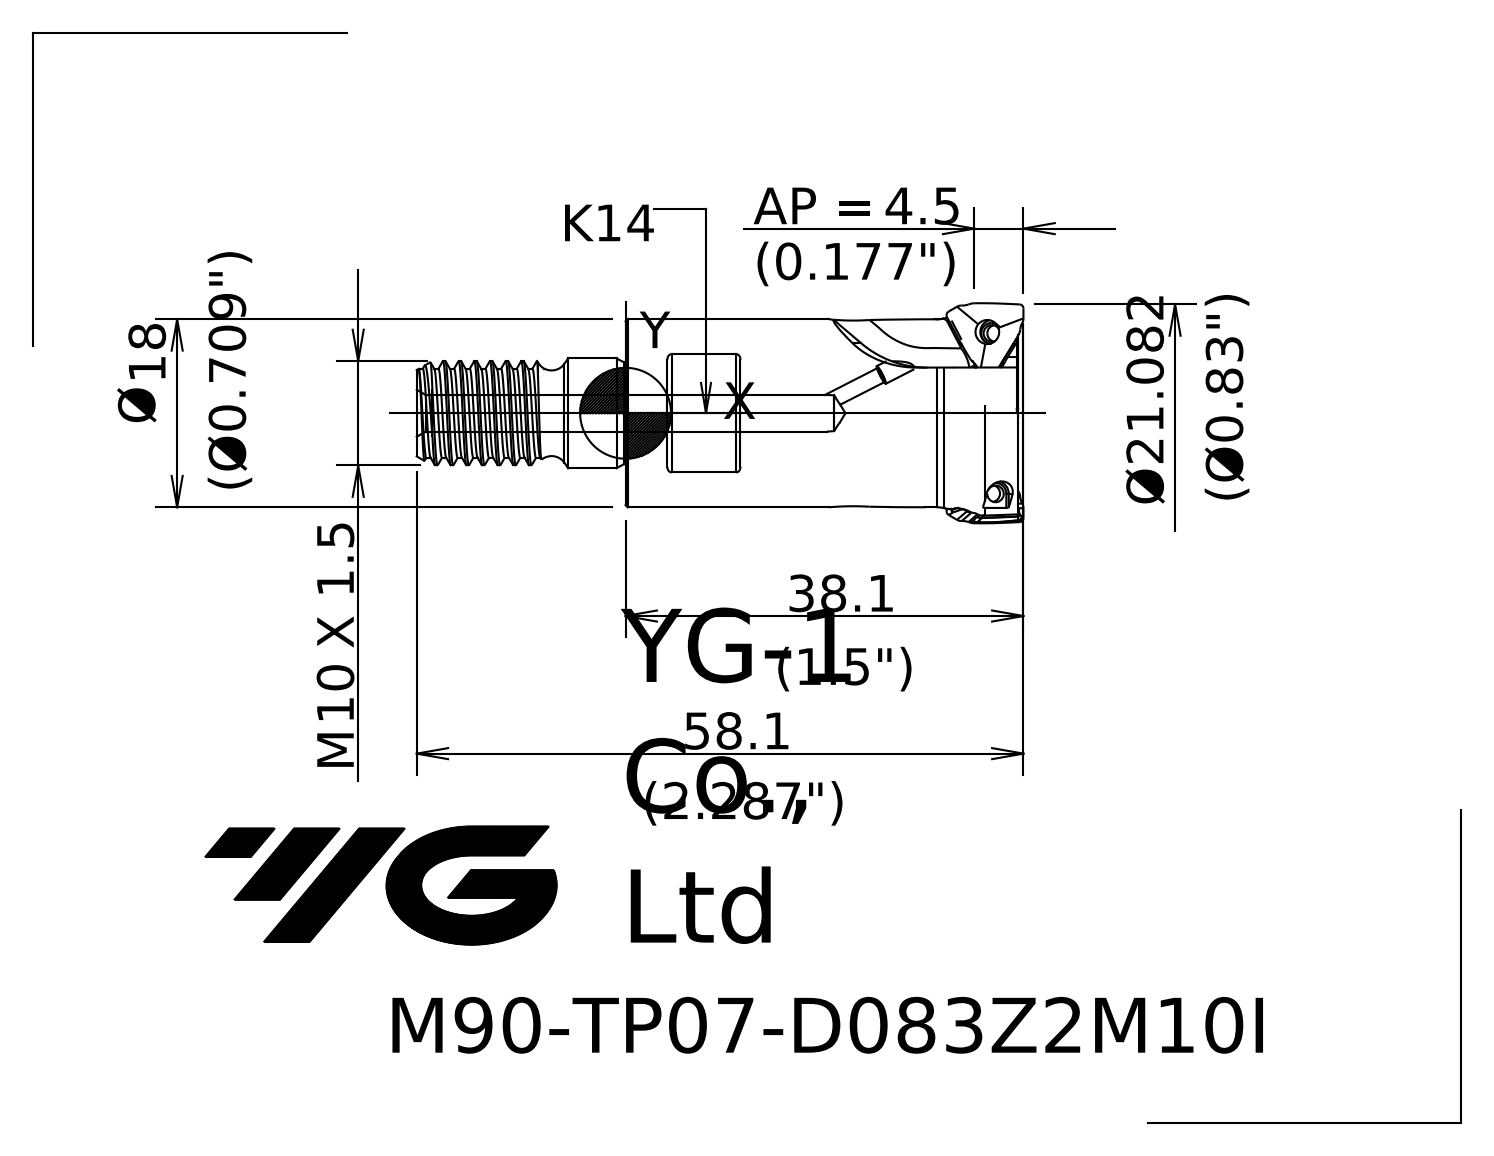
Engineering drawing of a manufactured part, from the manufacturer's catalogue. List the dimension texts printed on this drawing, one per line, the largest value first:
58.1
38.1
Ø21.082
4.5 AP =
M X 1.5 10
